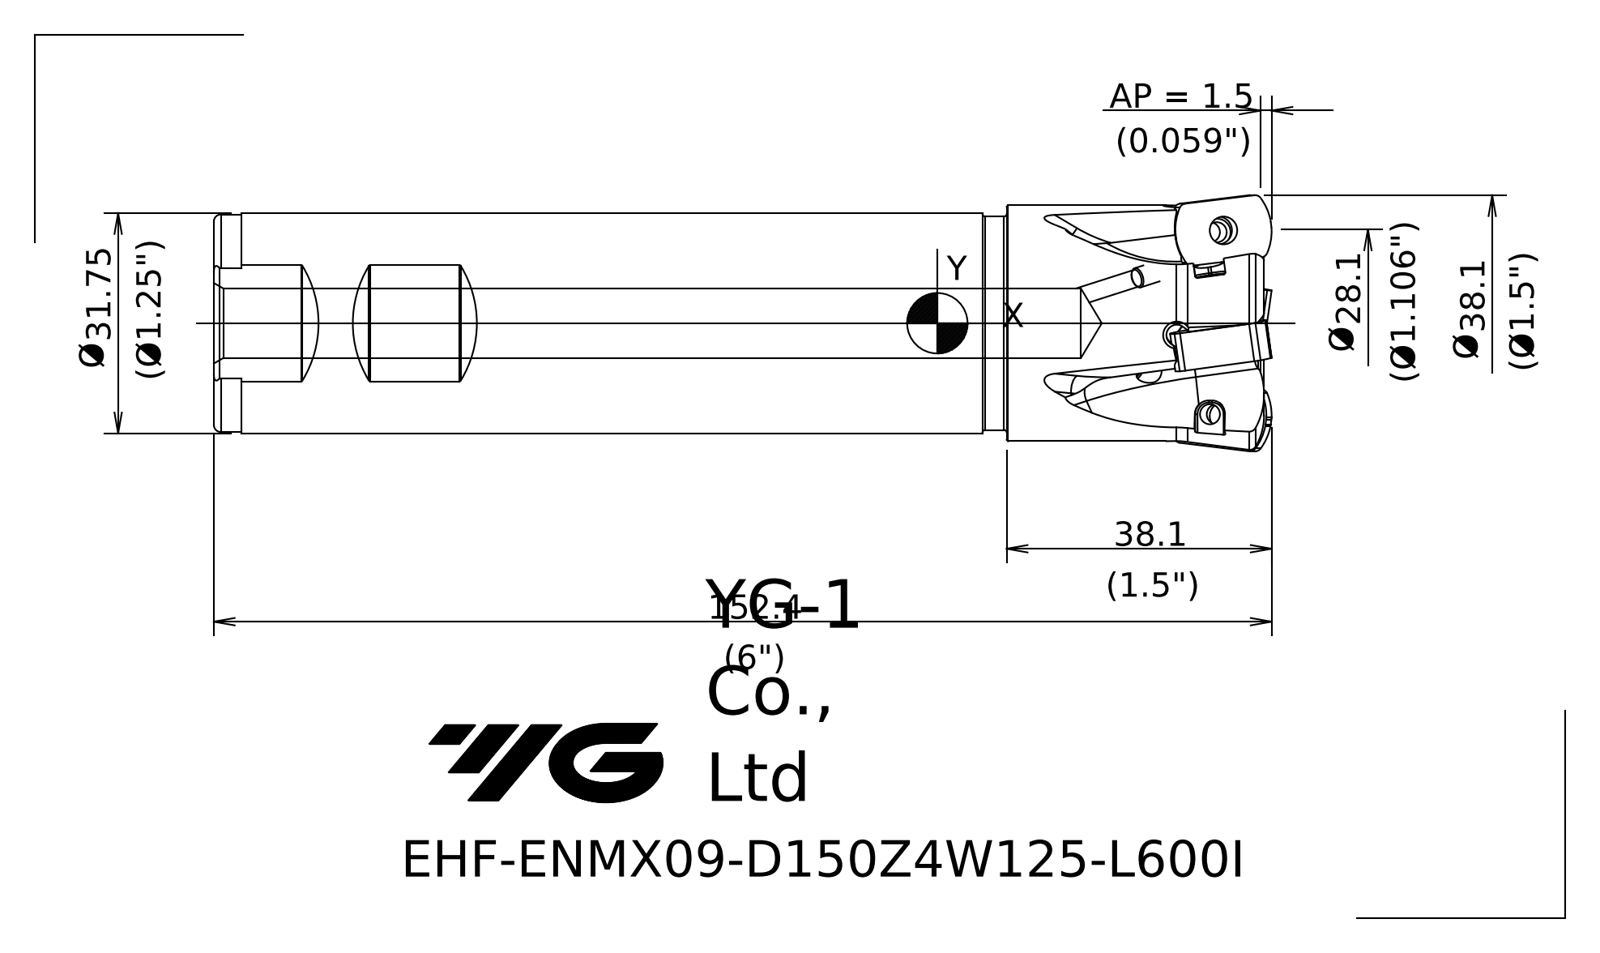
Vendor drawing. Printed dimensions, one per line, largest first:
152.4
38.1 Ø
38.1
28.1 Ø
AP = 1.5
